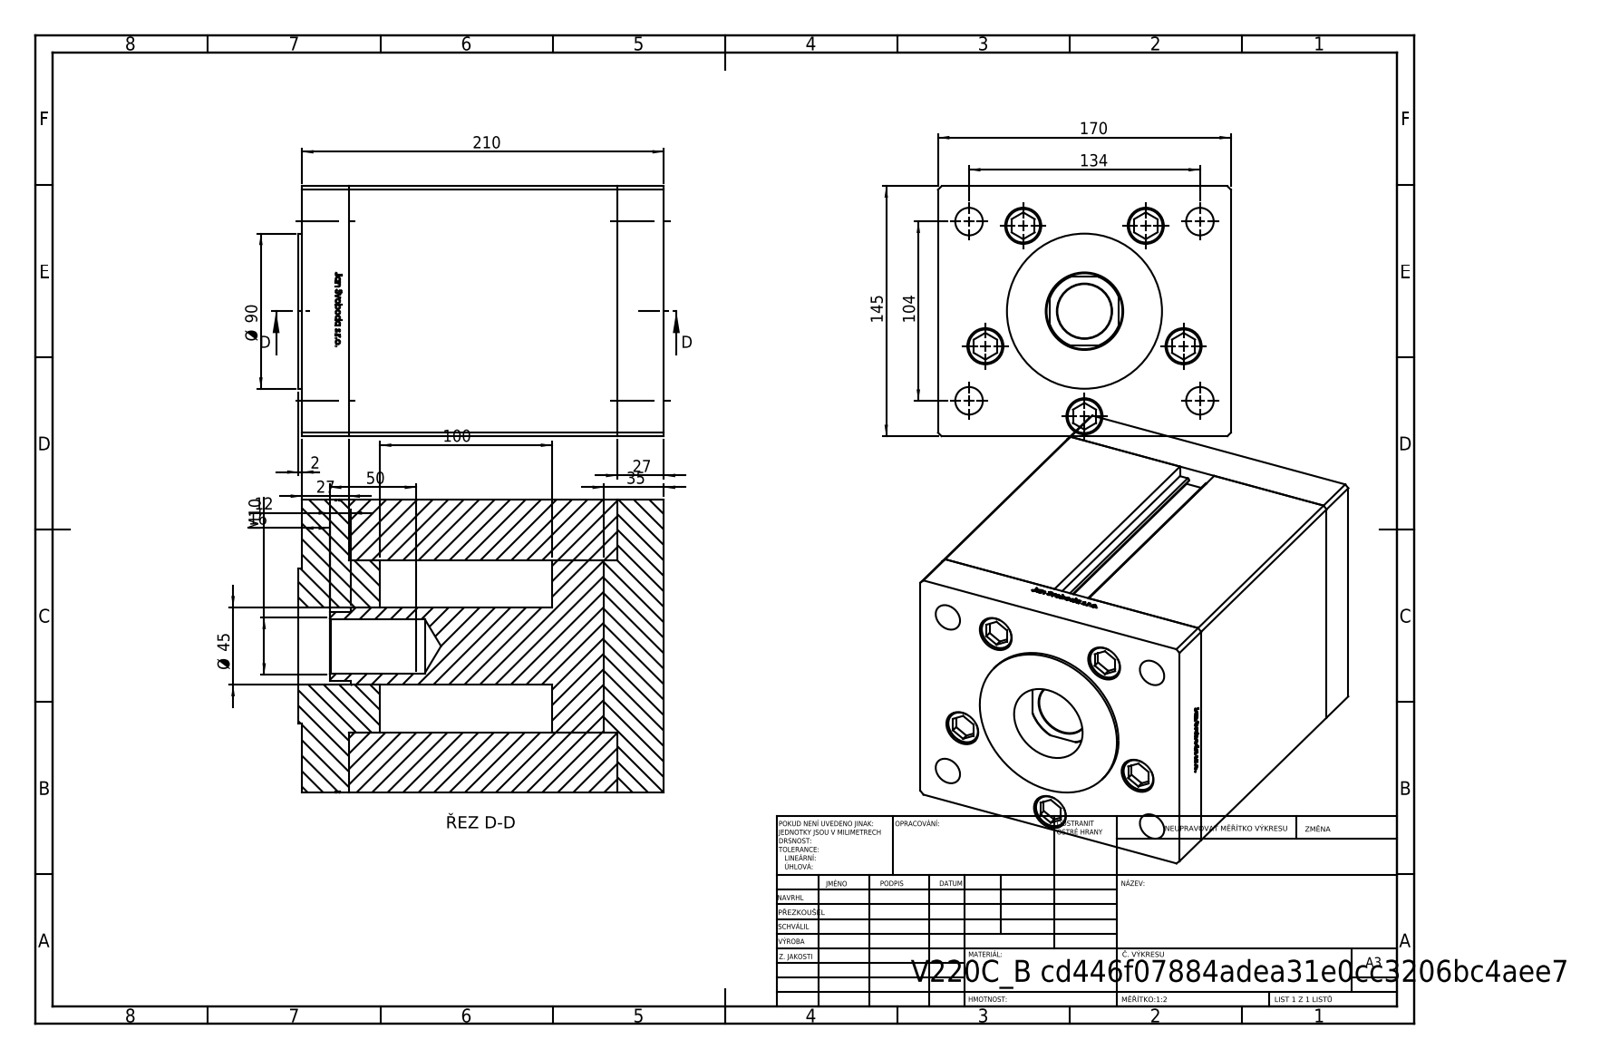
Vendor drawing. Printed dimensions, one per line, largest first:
210
170
145
134
104
100
Ø 90
50
Ø 45
35
27
27
16
12
M10
2
